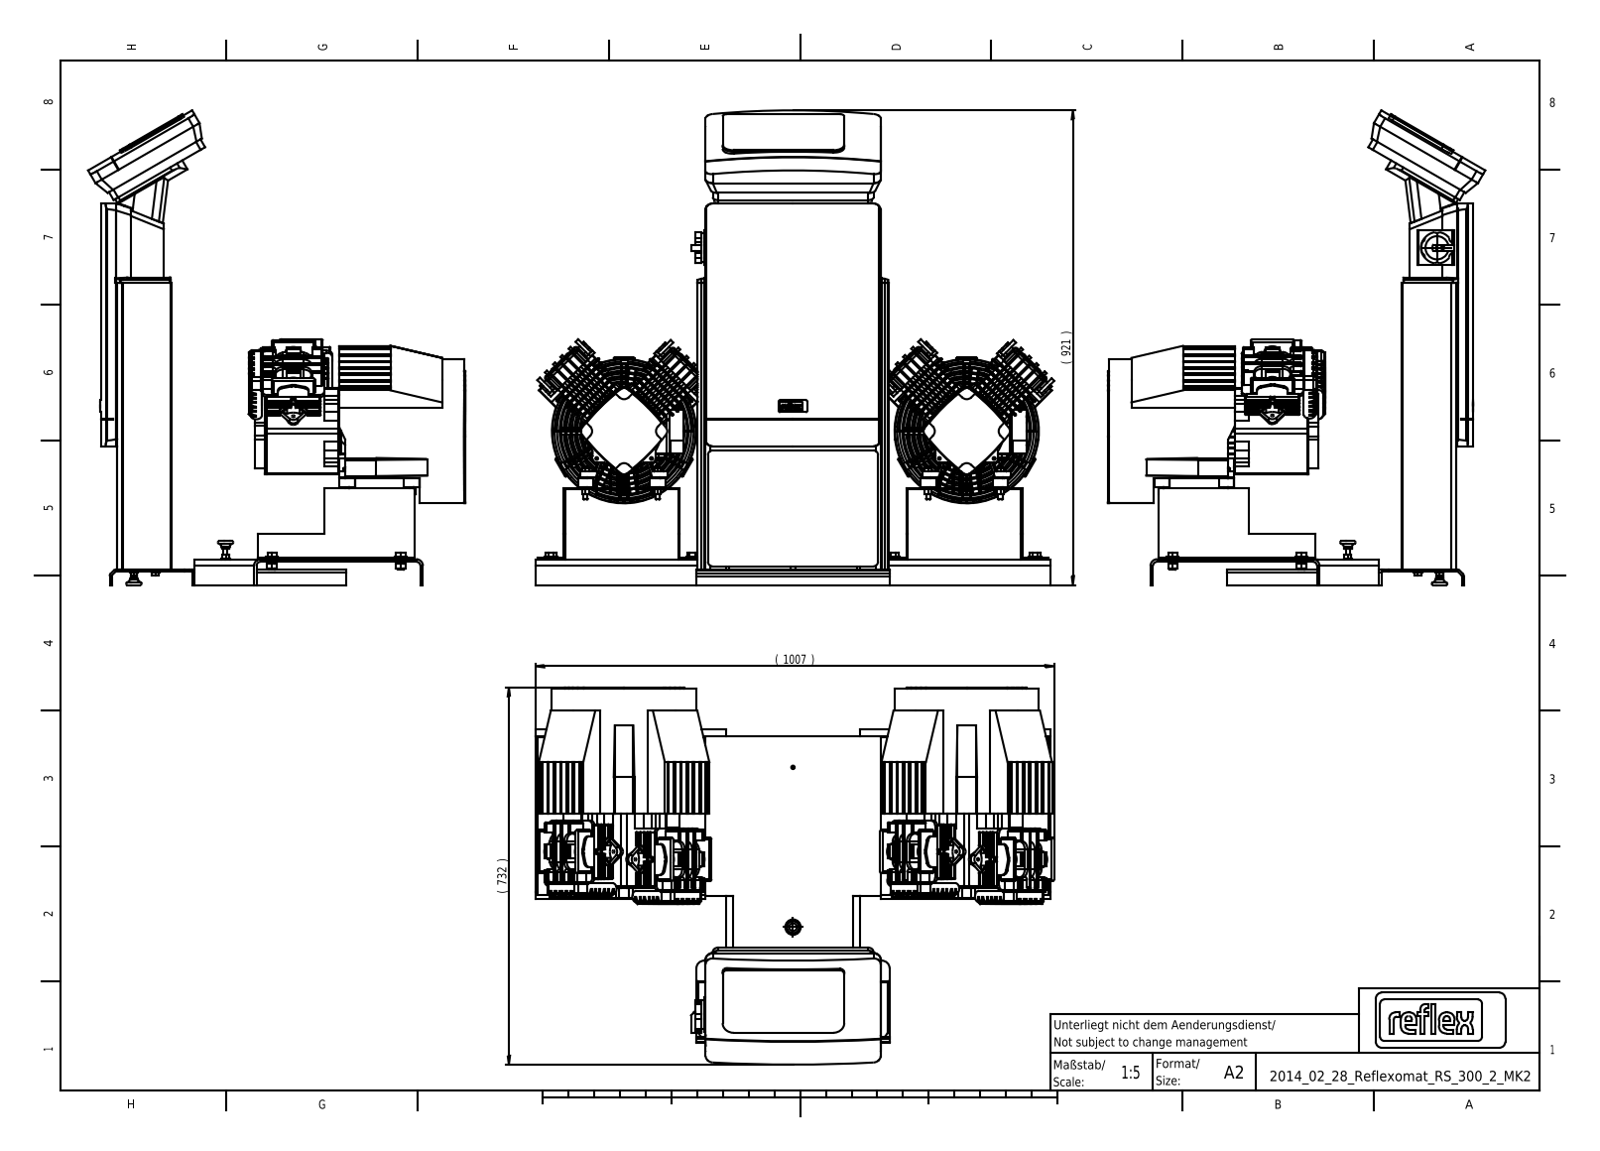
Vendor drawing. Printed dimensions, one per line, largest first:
1007 ( )
921 ( )
732 ( )
